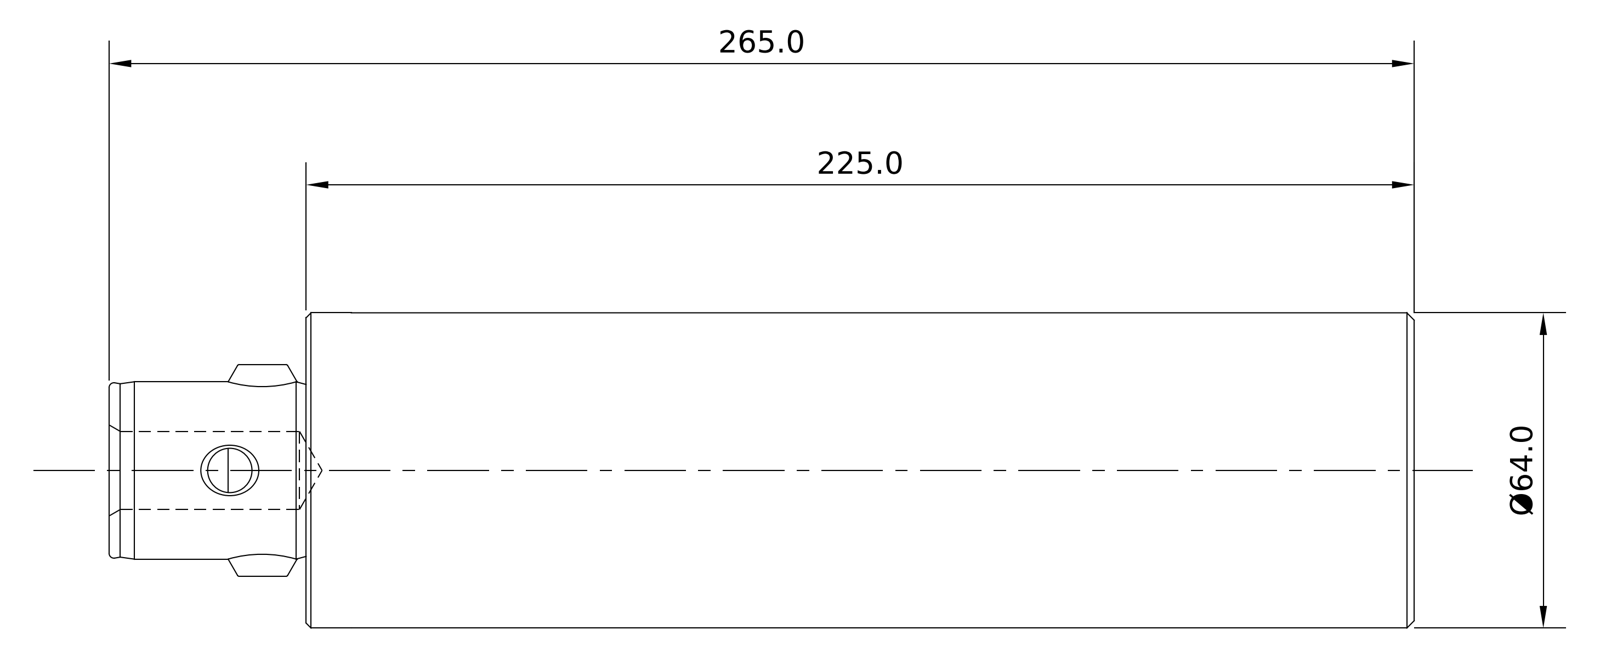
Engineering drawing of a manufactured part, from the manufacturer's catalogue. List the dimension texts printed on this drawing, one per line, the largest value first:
265.0
225.0
Ø64.0
